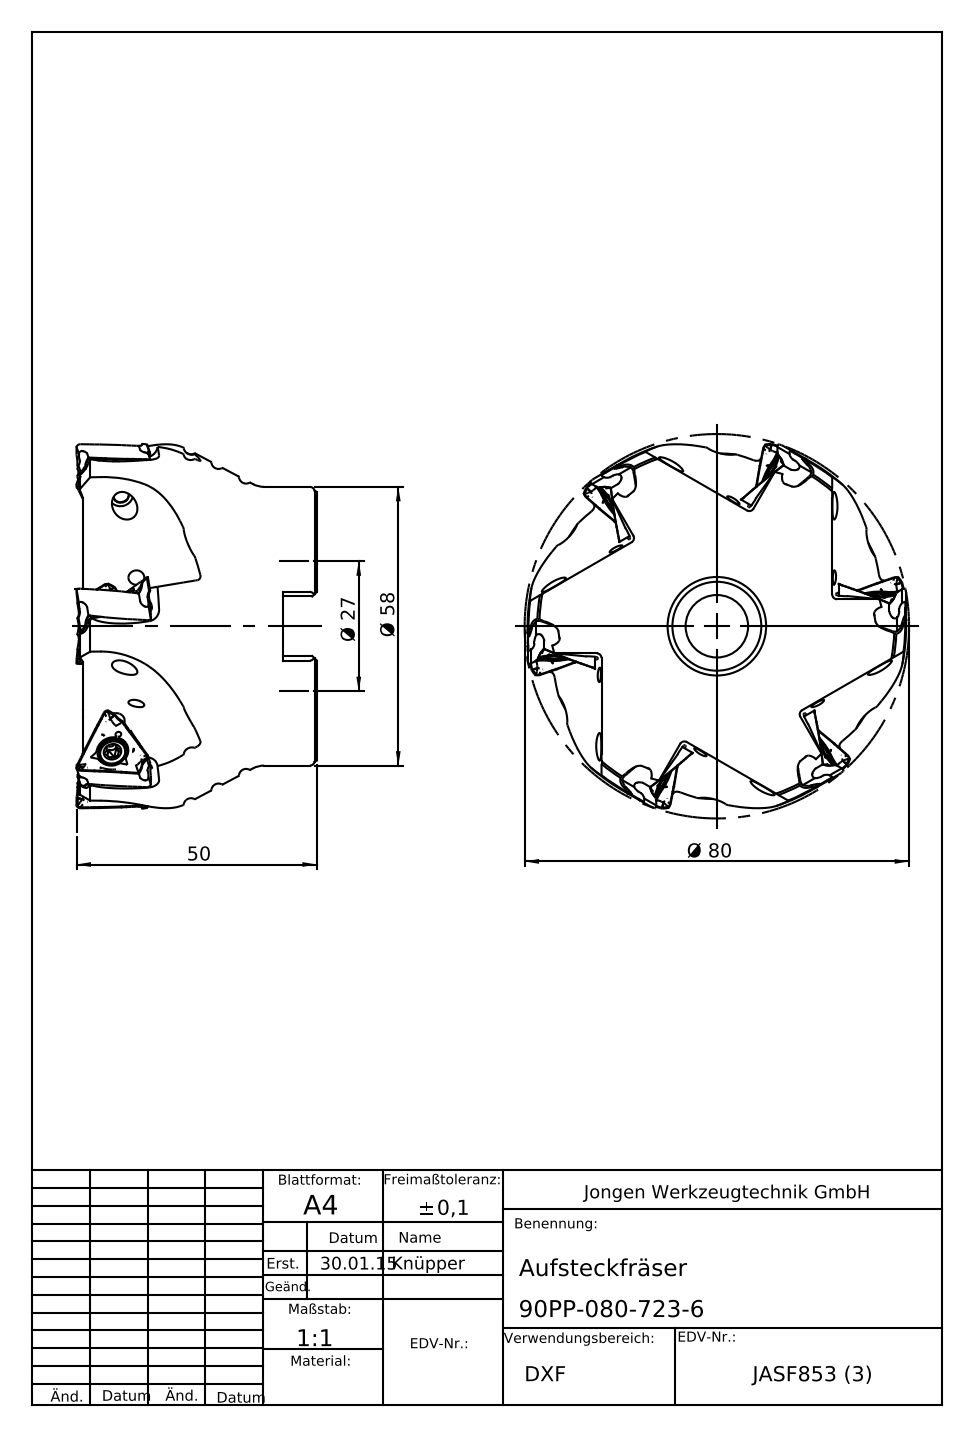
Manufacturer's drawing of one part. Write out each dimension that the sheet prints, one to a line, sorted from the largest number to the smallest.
Ø 80
Ø 58
50
Ø 27
